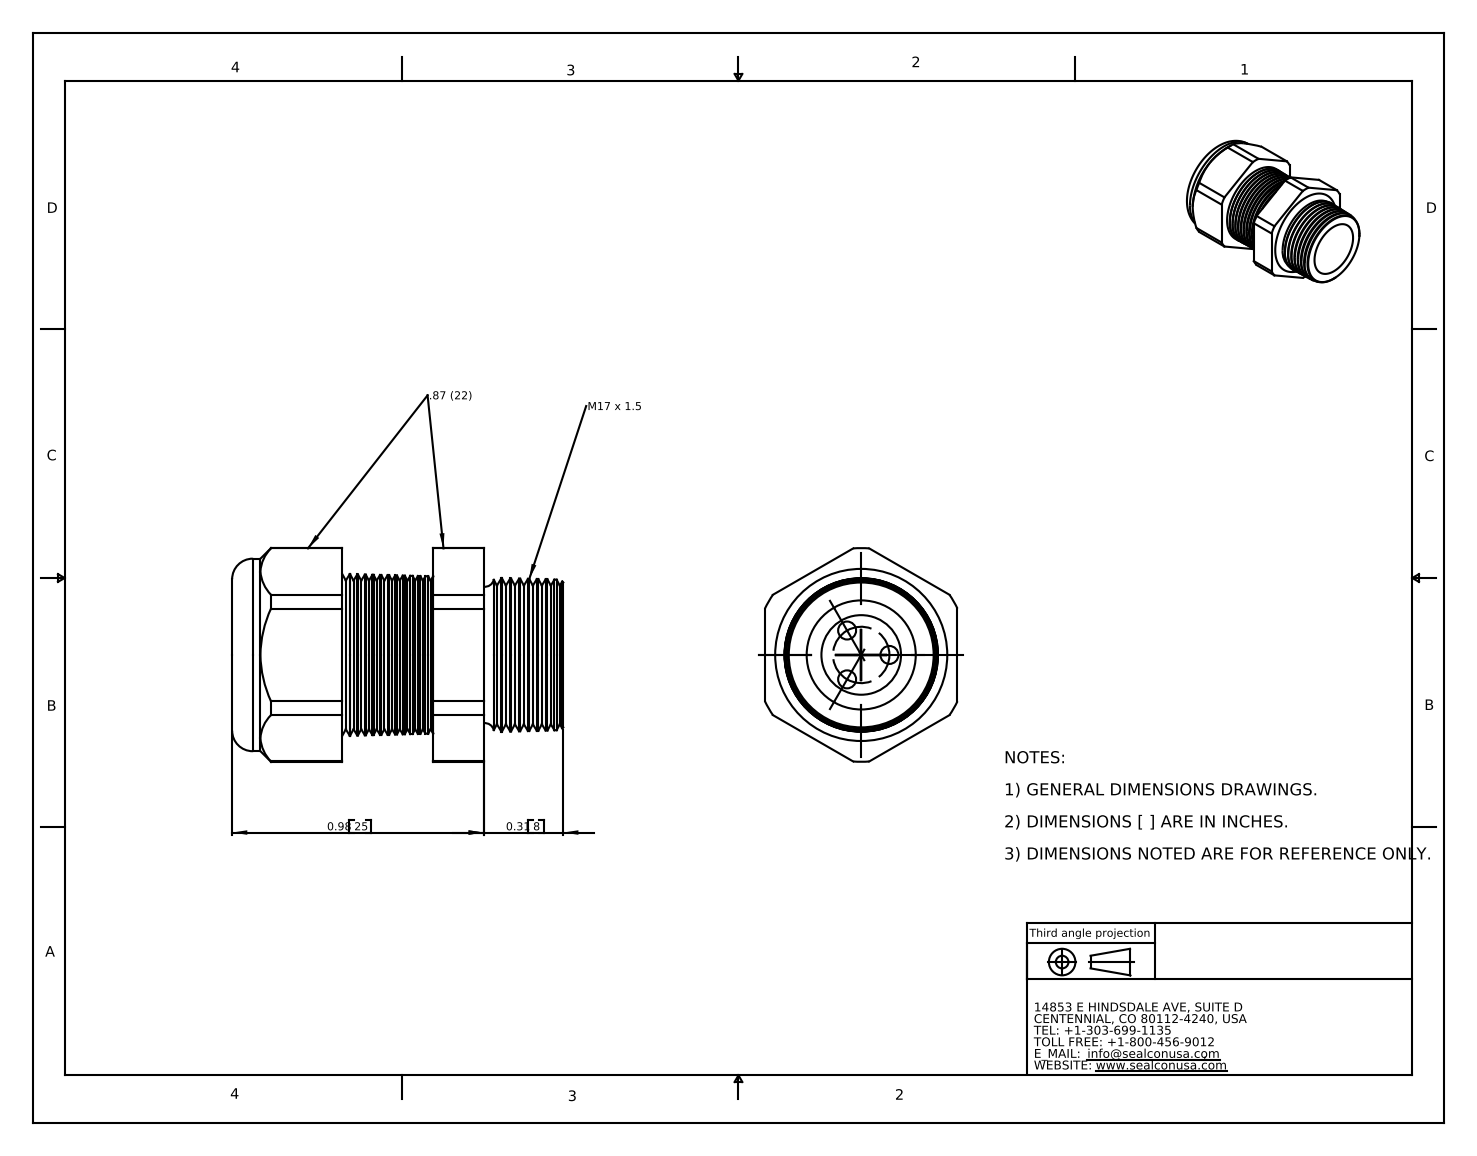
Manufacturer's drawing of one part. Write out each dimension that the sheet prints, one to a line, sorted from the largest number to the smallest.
0.98 25
0.31 8
